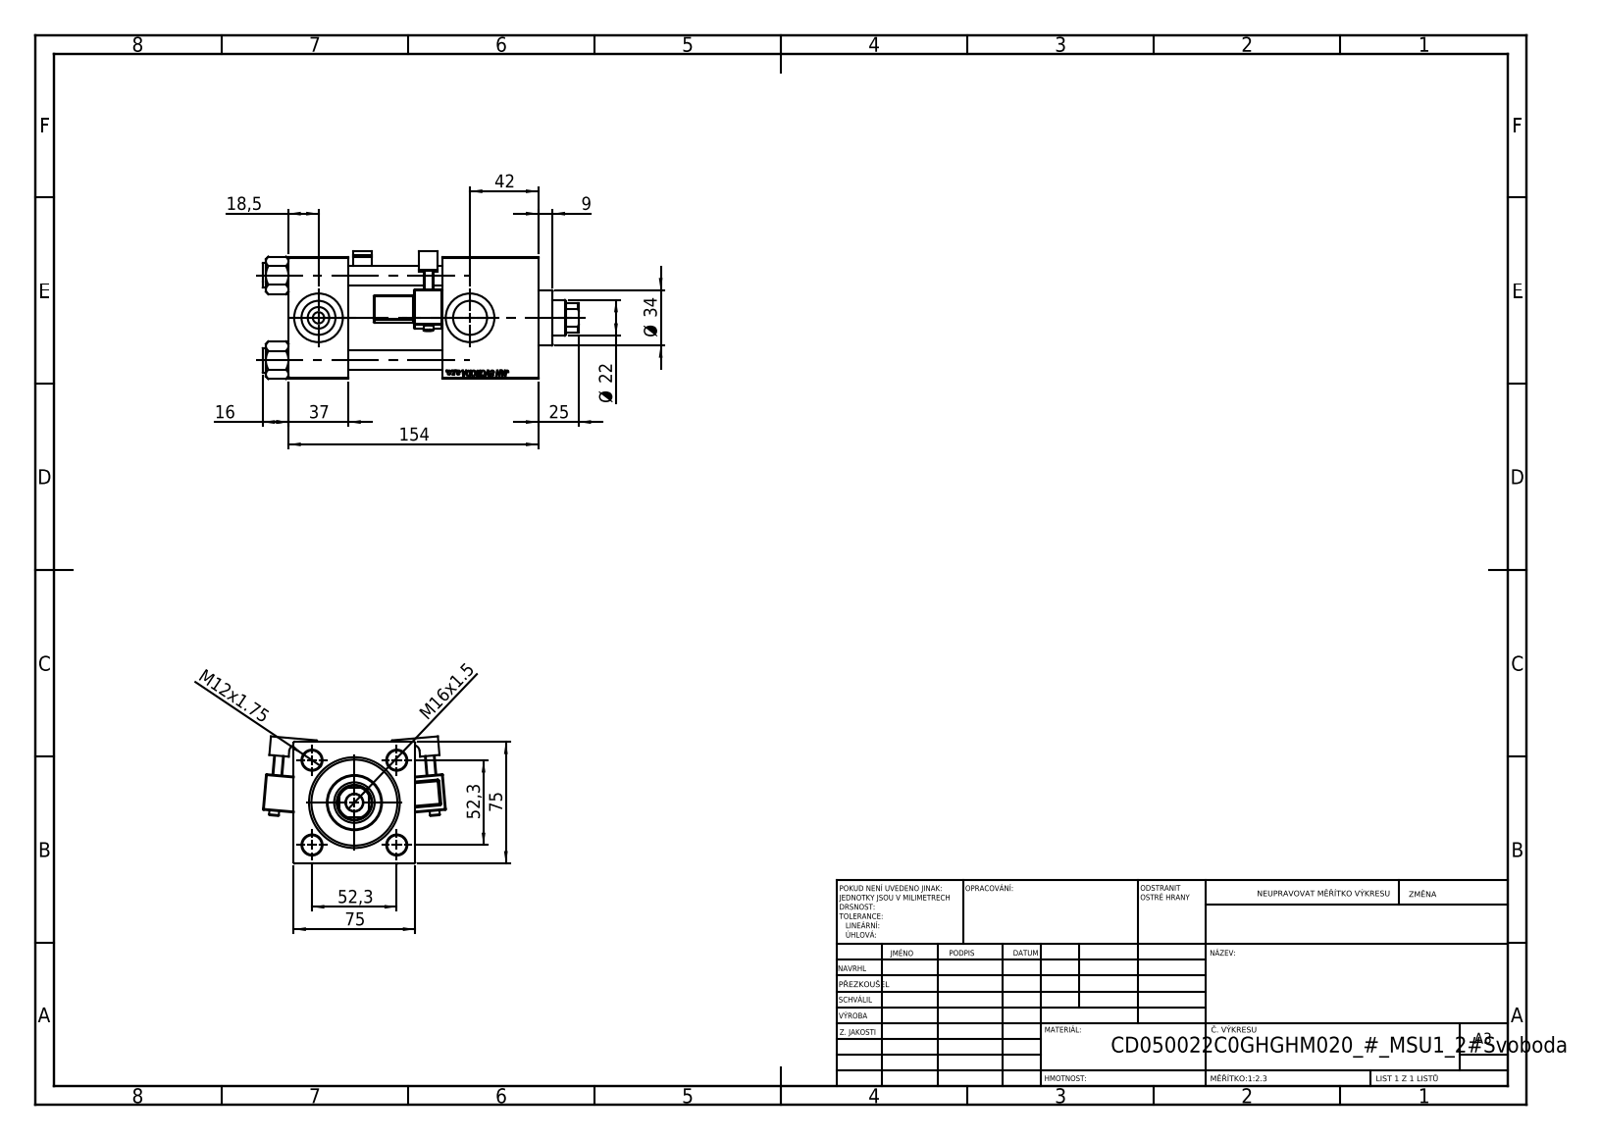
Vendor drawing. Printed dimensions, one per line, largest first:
154
75
75
52,3
52,3
42
37
Ø 34
25
Ø 22
18,5
16
M16x1.5
M12x1.75
9
